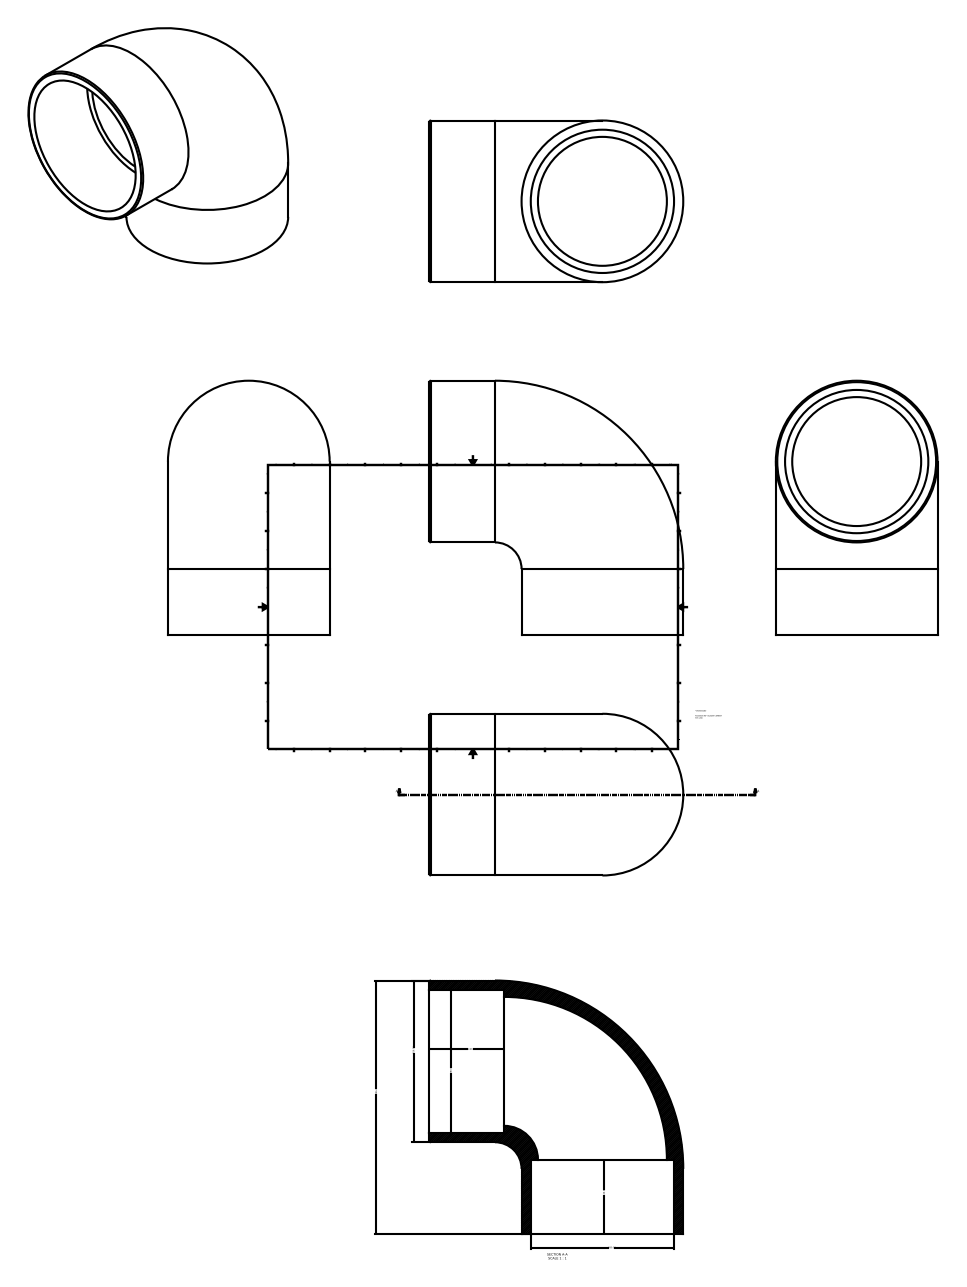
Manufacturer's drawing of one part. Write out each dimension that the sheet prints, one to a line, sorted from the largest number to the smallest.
496.00
316.00
280.00
280.00
146.00
146.00
